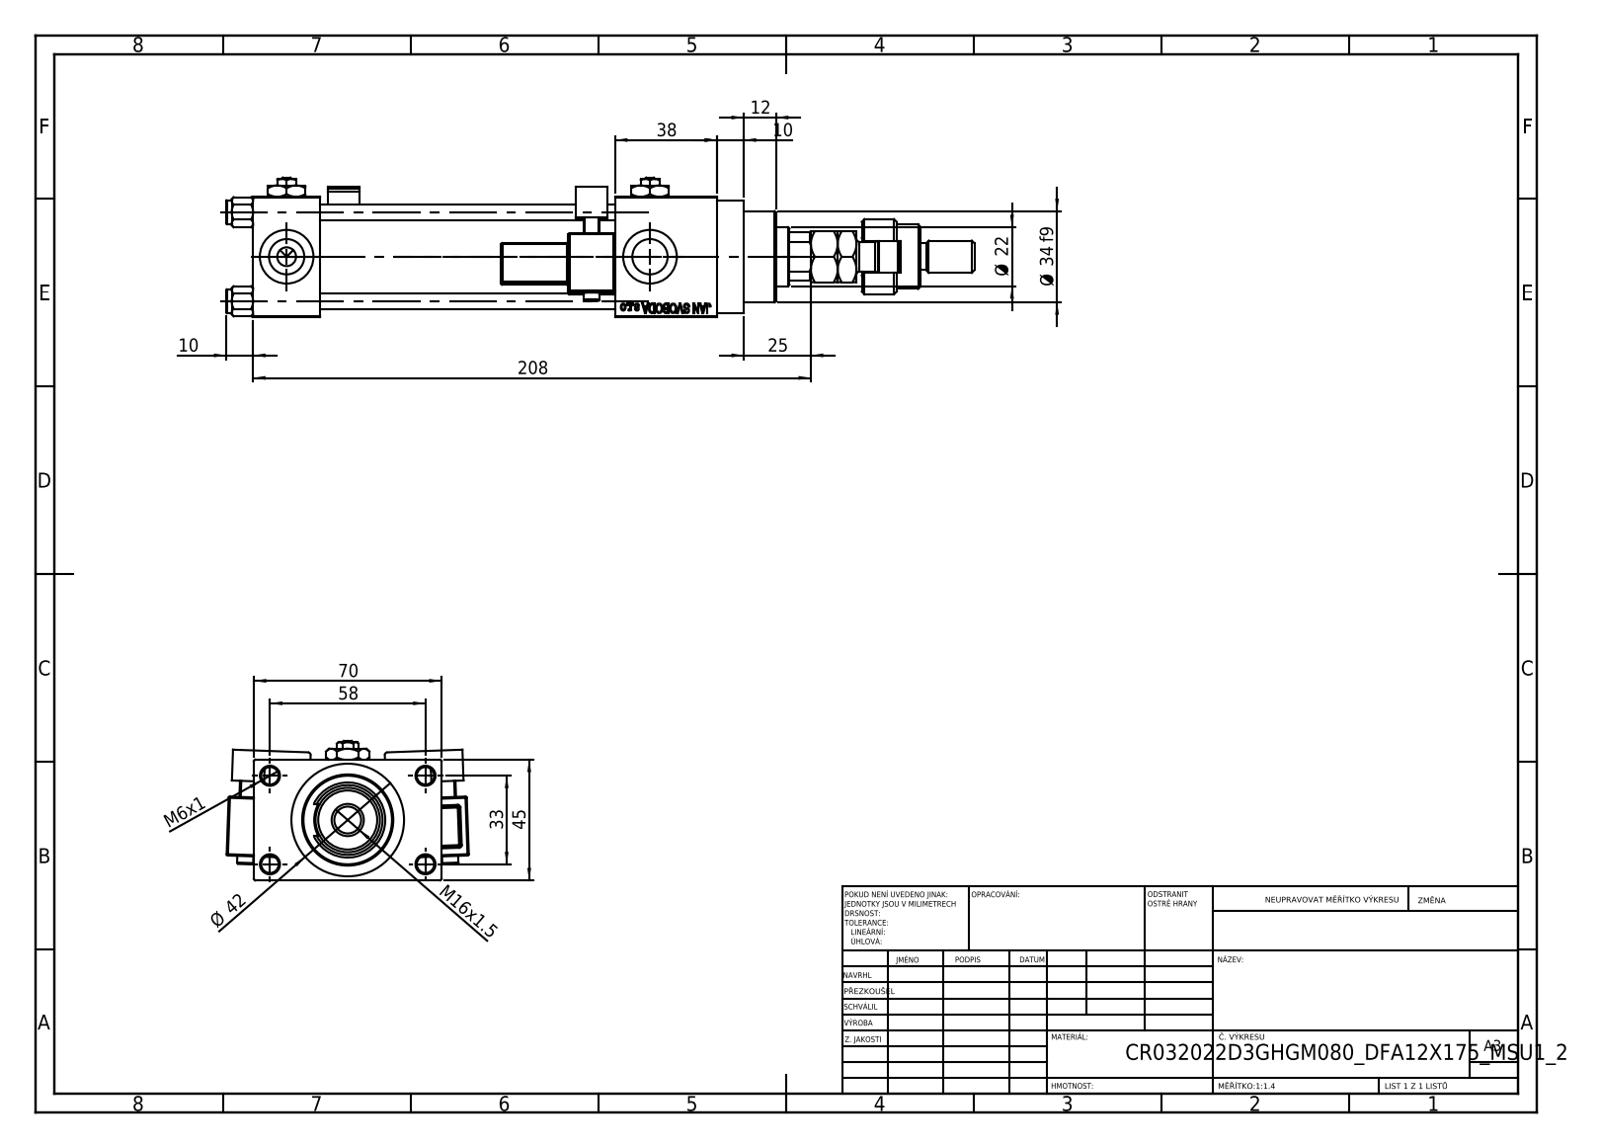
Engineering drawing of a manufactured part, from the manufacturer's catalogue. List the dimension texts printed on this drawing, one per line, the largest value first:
208
70
58
45
Ø 42
38
Ø 34 f9
33
25
Ø 22
M16x1.5
12
10
10
M6x1
